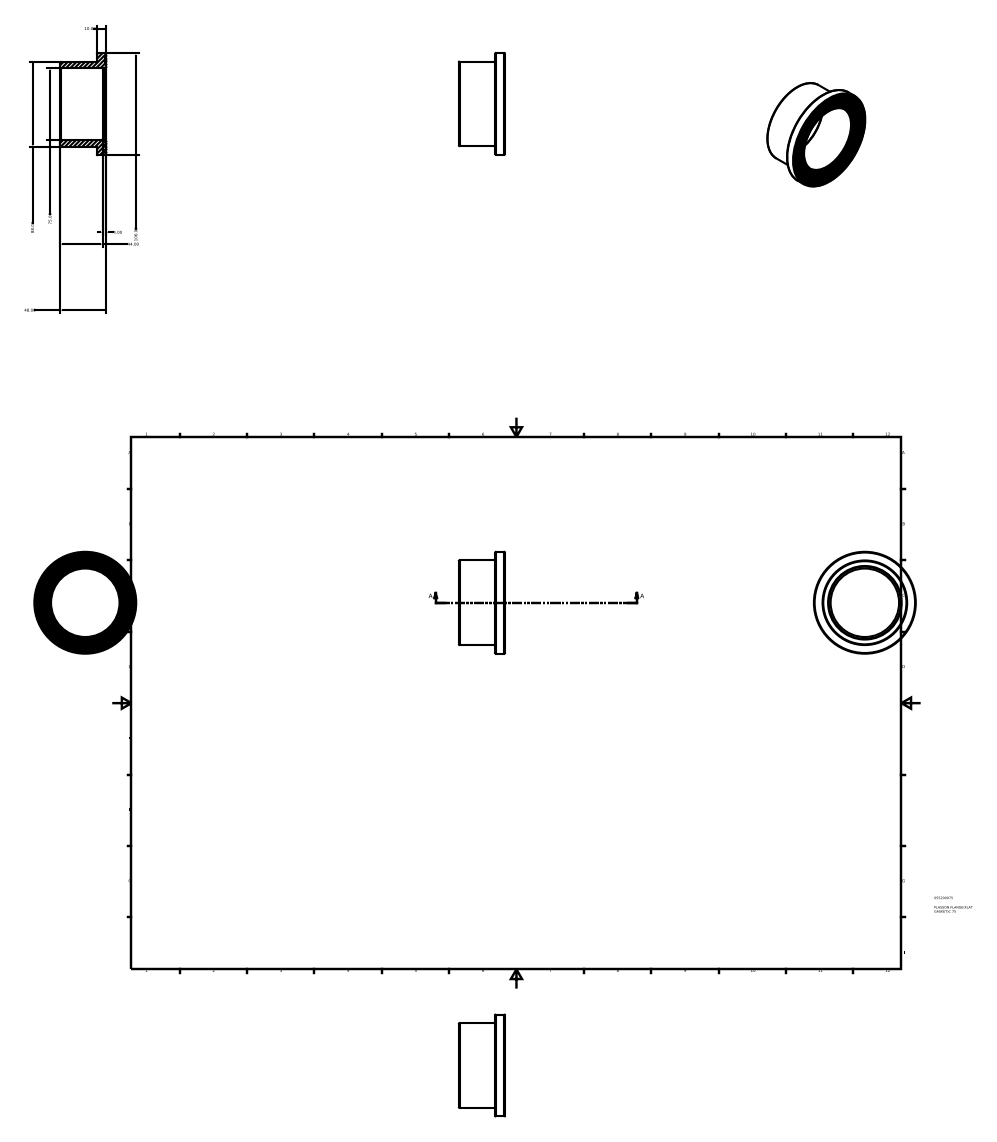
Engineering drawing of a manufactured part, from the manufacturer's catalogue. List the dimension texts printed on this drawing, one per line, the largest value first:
106.00
88.00
75.00
48.00
44.00
10.00
4.00
